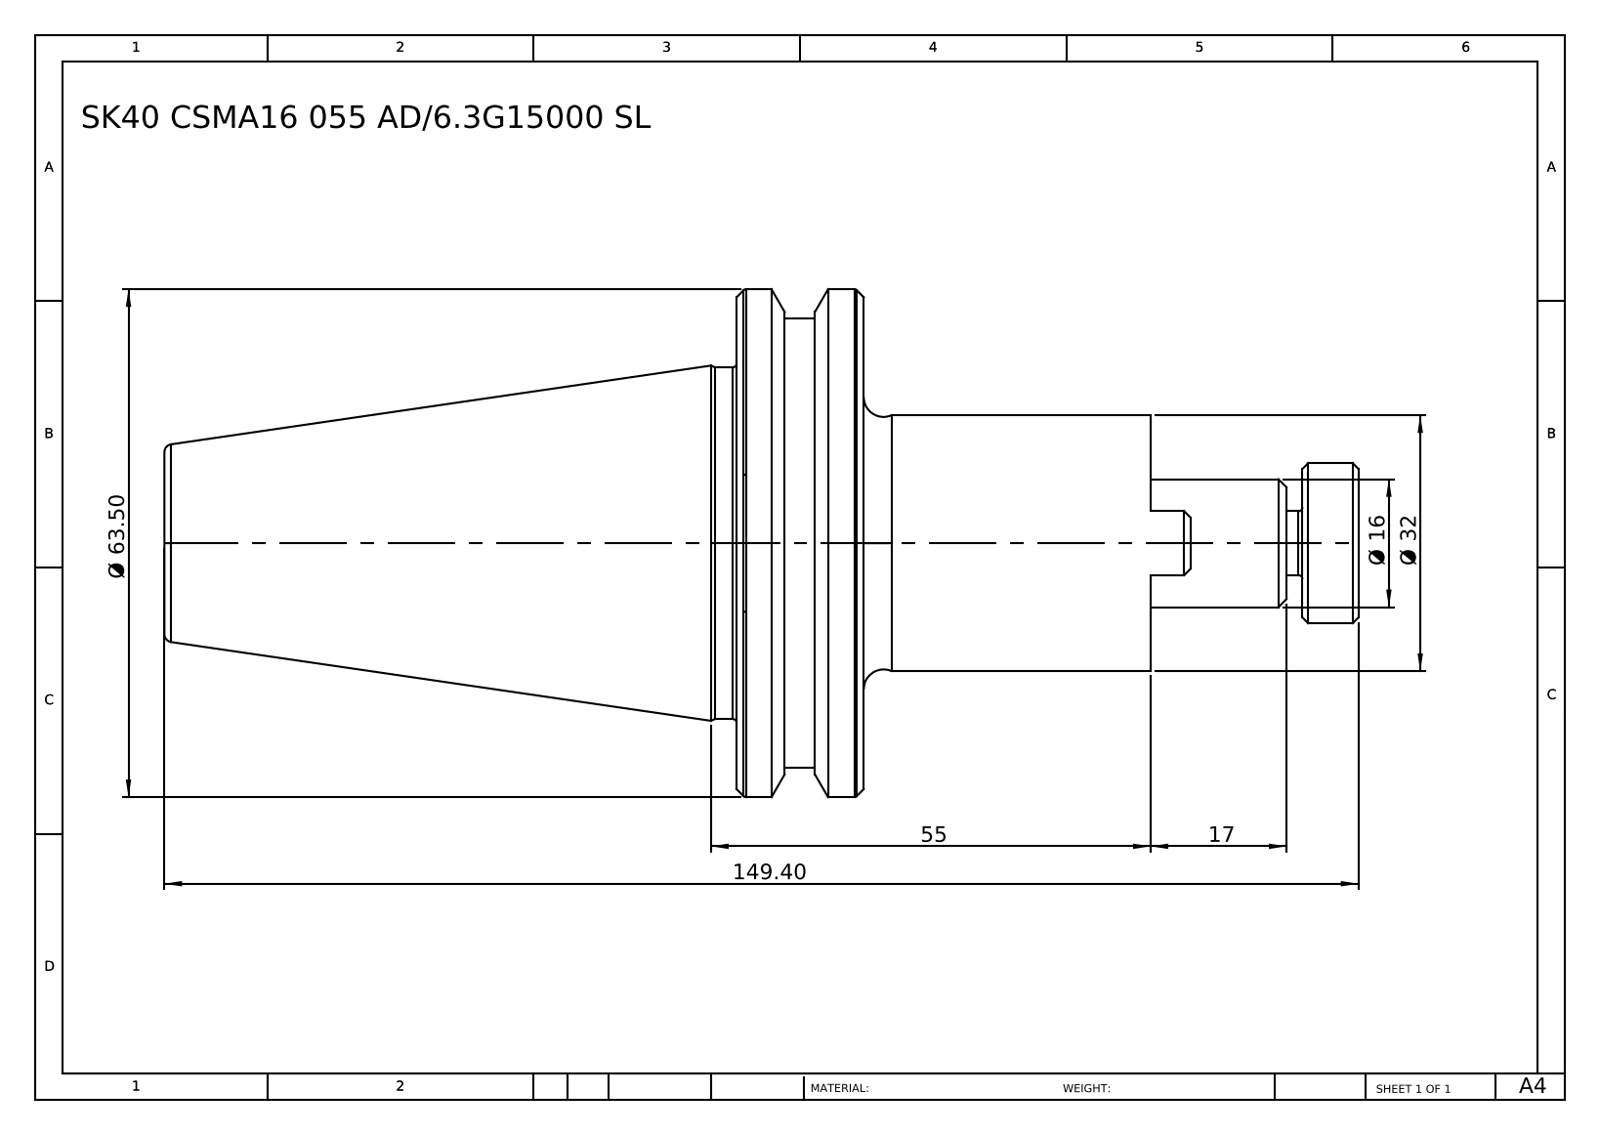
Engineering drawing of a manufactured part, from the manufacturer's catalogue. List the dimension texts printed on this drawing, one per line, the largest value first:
149.40
Ø 63.50
55
Ø 32
17
Ø 16
